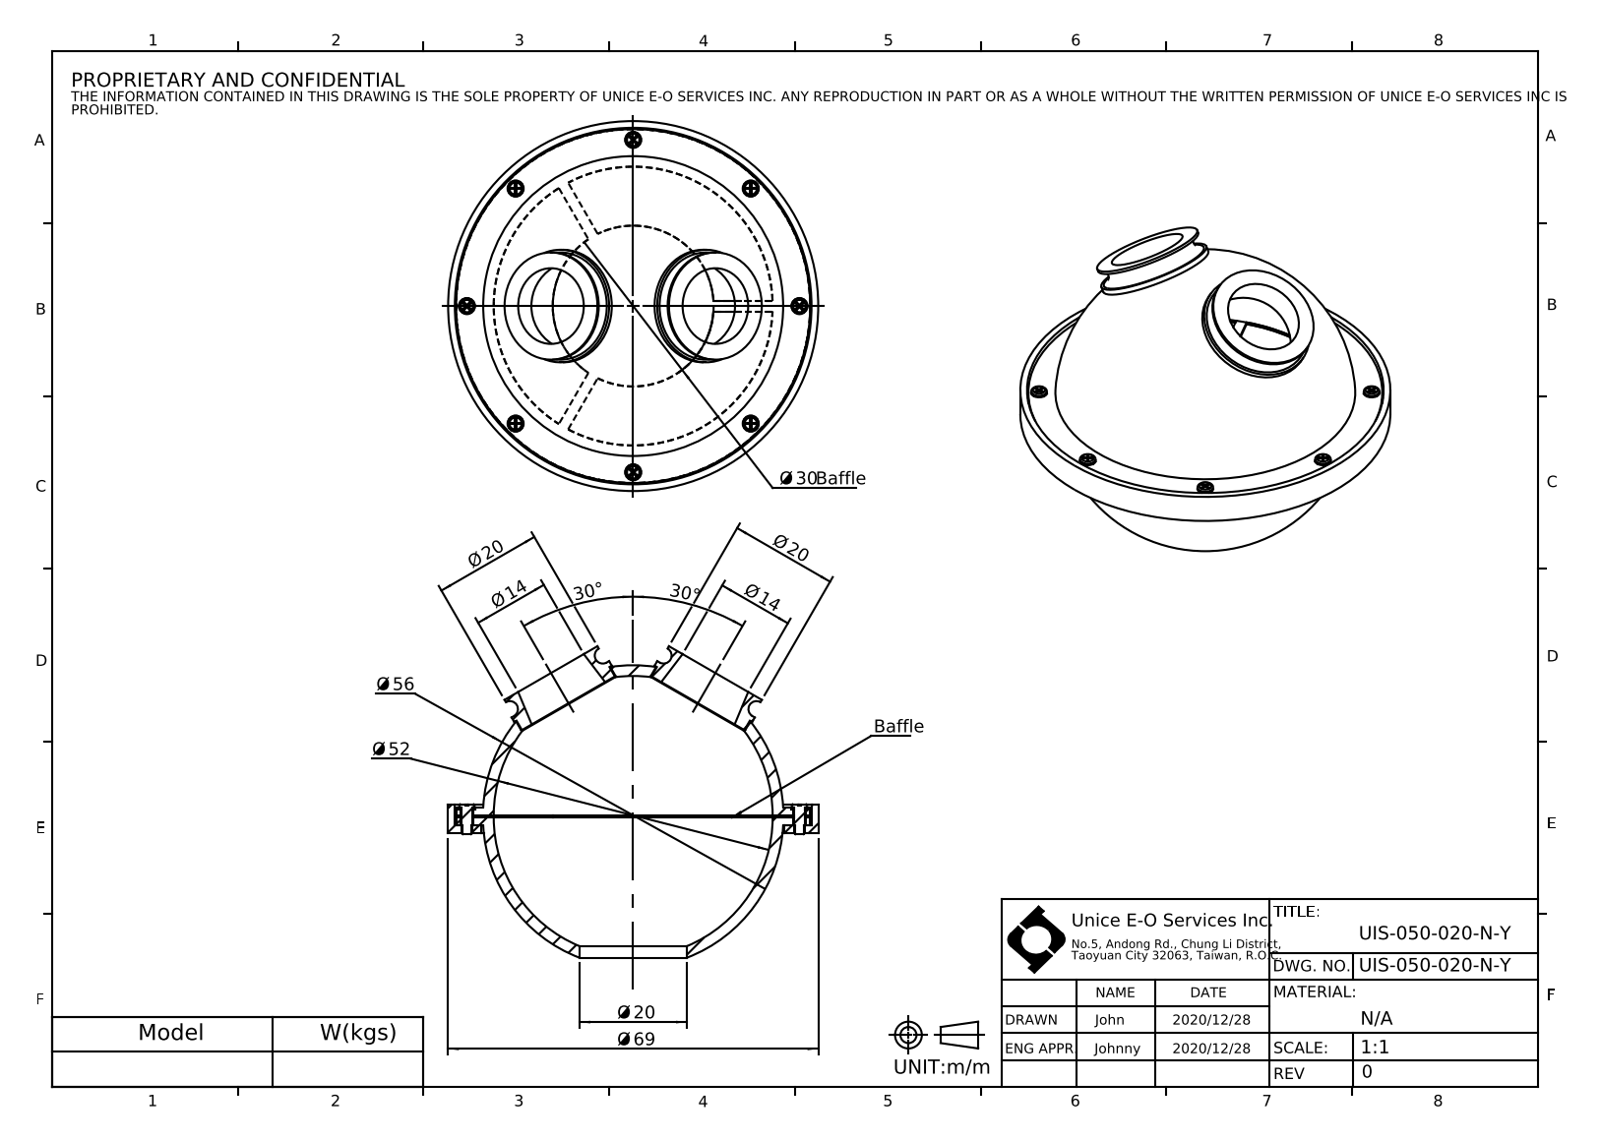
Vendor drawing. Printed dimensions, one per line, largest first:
Ø 69
Ø 56
Ø 52
30°
30°
Ø 30 Baffle
Ø 20
Ø 20
Ø 20
Ø 14
Ø 14
